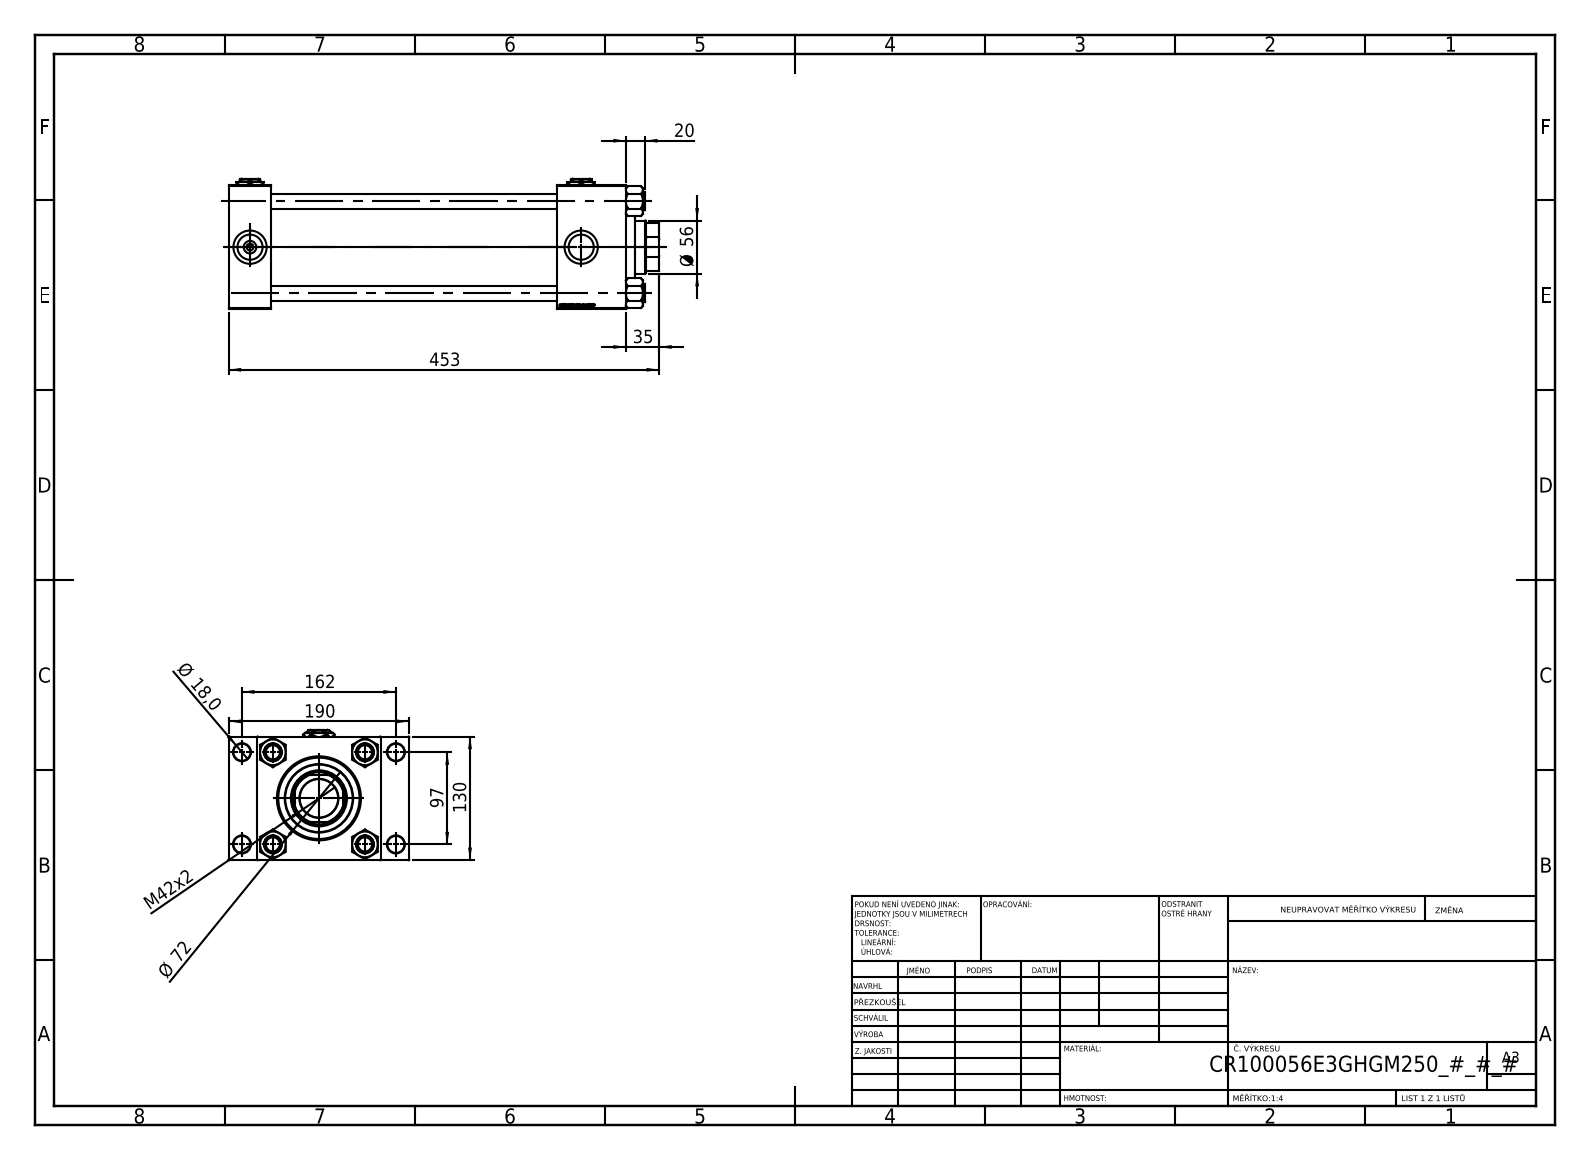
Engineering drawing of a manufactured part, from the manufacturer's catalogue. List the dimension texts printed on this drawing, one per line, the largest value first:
453
190
162
130
97
Ø 72
Ø 56
M42x2
35
20
Ø 18,0
